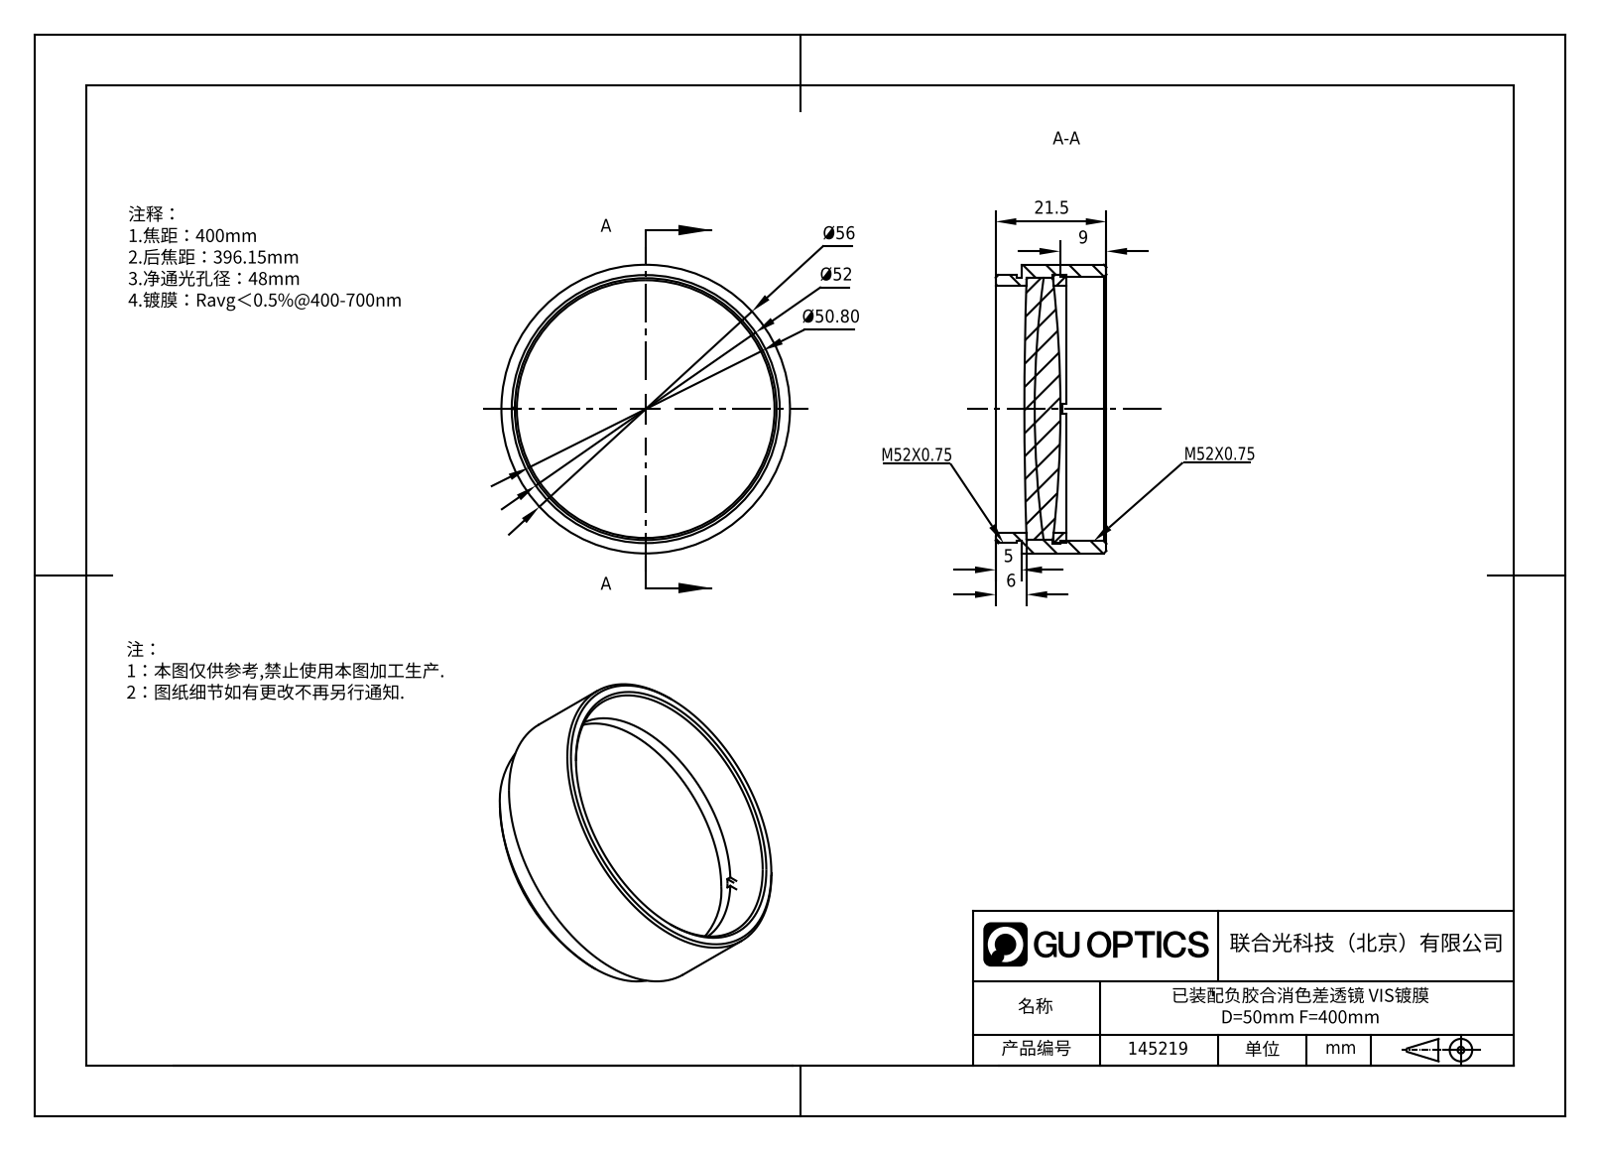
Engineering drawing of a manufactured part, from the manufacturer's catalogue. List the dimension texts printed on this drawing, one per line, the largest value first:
Ø56
Ø52
Ø50.80
21.5
9
6
5
